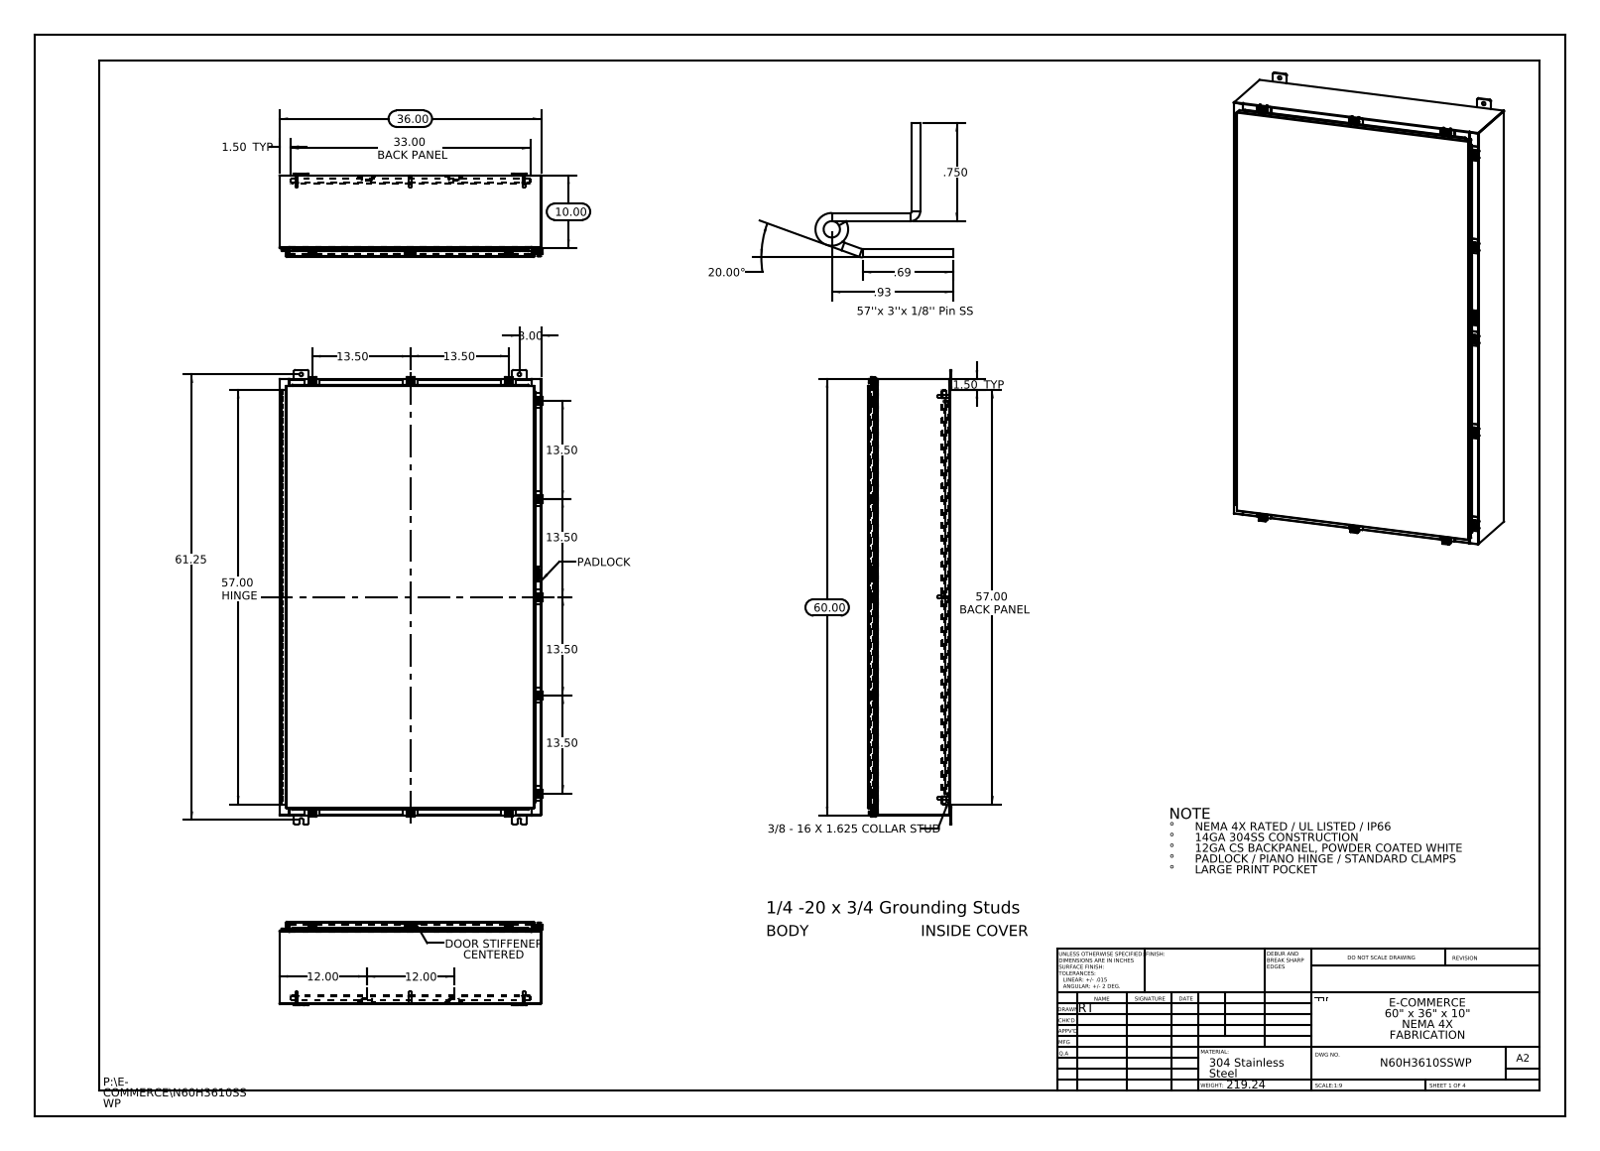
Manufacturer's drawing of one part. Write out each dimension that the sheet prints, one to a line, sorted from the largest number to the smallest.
61.25
60.00
57.00 HINGE
57.00 BACK PANEL
36.00
33.00 BACK PANEL
20.00°
13.50
13.50
13.50
13.50
13.50
13.50
12.00
12.00
10.00
3.00
1.50 TYP
1.50 TYP
.93
.750
.69
